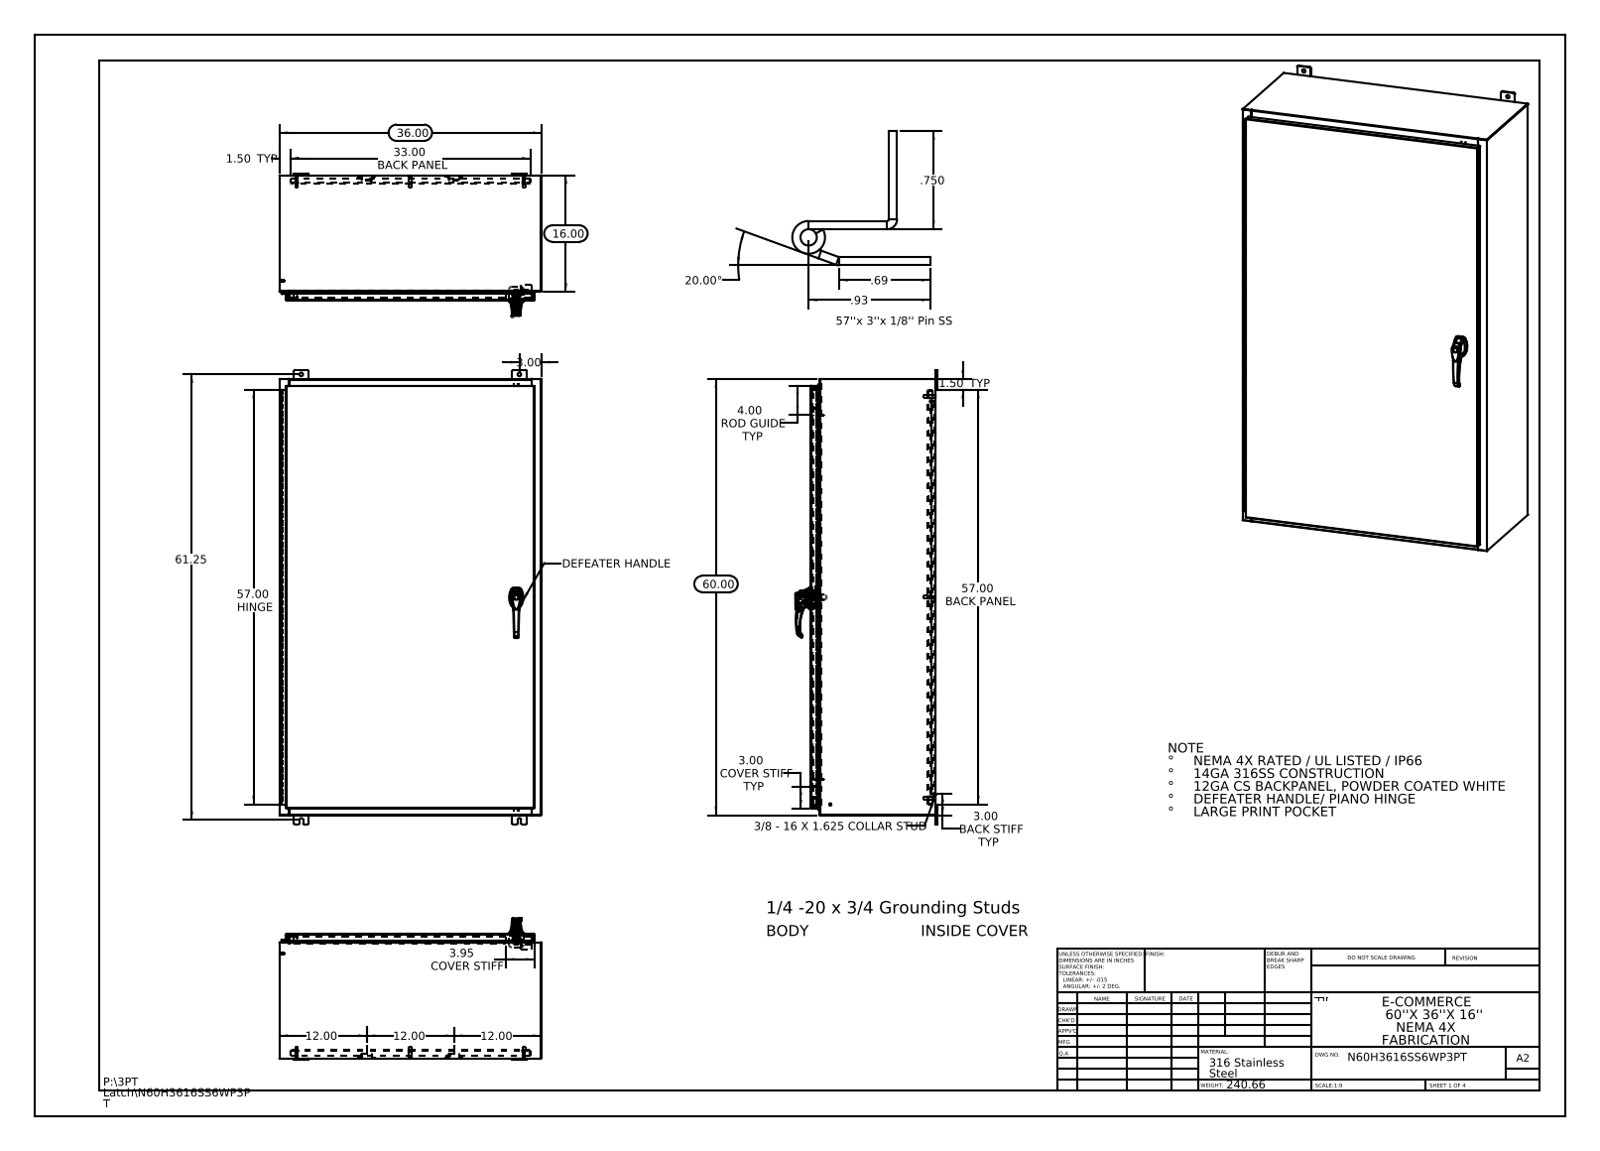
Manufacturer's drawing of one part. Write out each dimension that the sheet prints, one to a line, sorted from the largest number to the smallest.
61.25
60.00
57.00 HINGE
57.00 BACK PANEL
36.00
33.00 BACK PANEL
20.00°
16.00
12.00
12.00
12.00
4.00 ROD GUIDE TYP
3.95 COVER STIFF
3.00
3.00 BACK STIFF TYP
3.00 COVER STIFF TYP
1.50 TYP
1.50 TYP
.93
.750
.69
